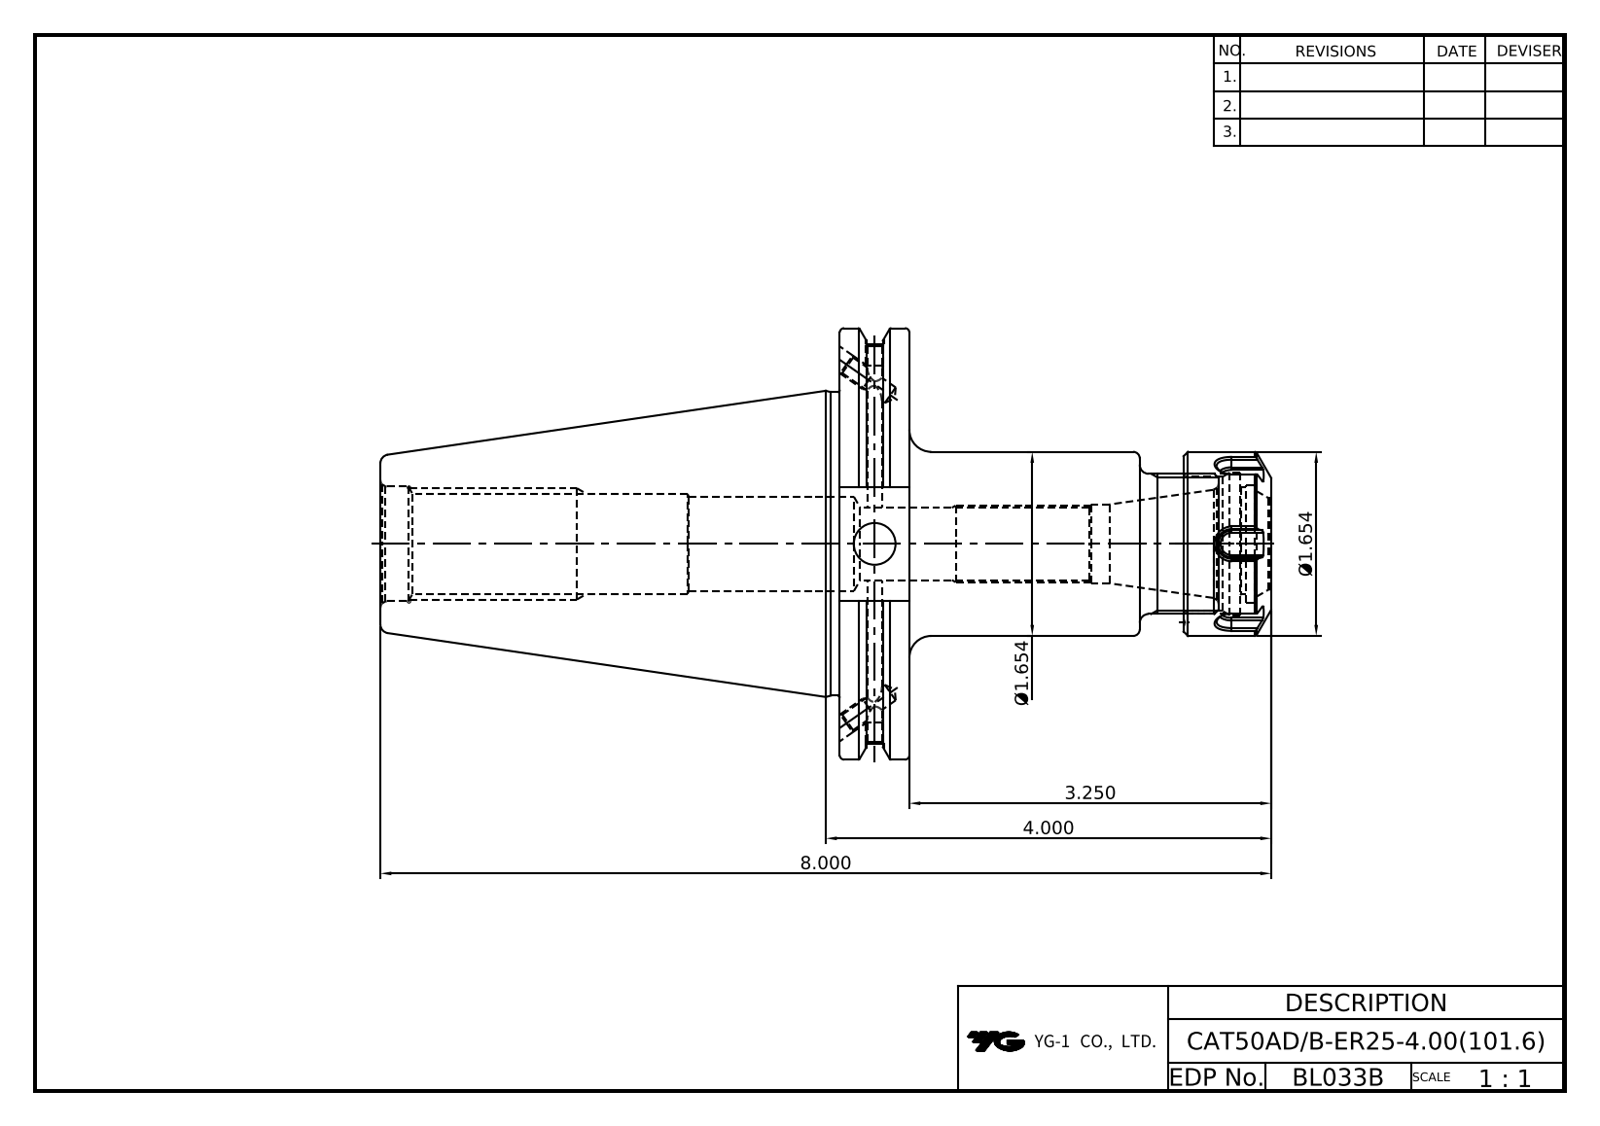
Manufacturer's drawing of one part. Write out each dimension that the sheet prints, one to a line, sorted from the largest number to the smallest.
8.000
4.000
3.250
Ø1.654
Ø1.654
